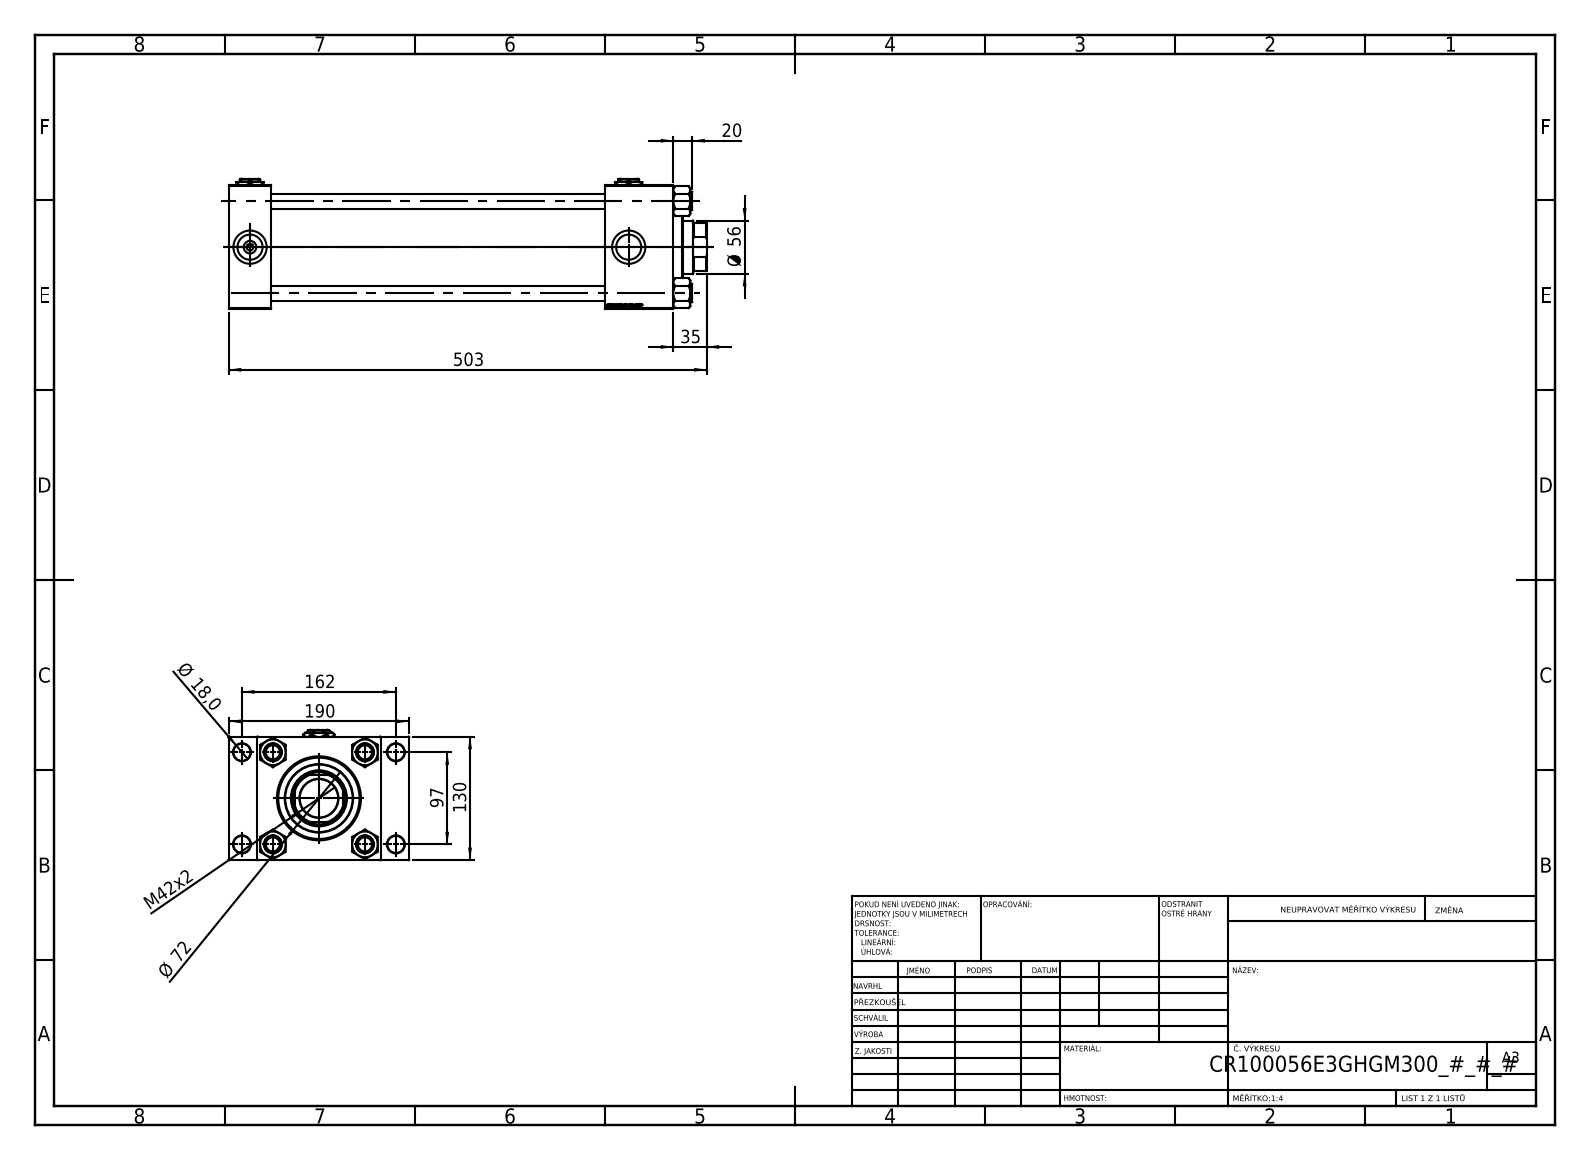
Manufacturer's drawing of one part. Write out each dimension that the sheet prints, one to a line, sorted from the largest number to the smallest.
503
190
162
130
97
Ø 72
Ø 56
M42x2
35
20
Ø 18,0
